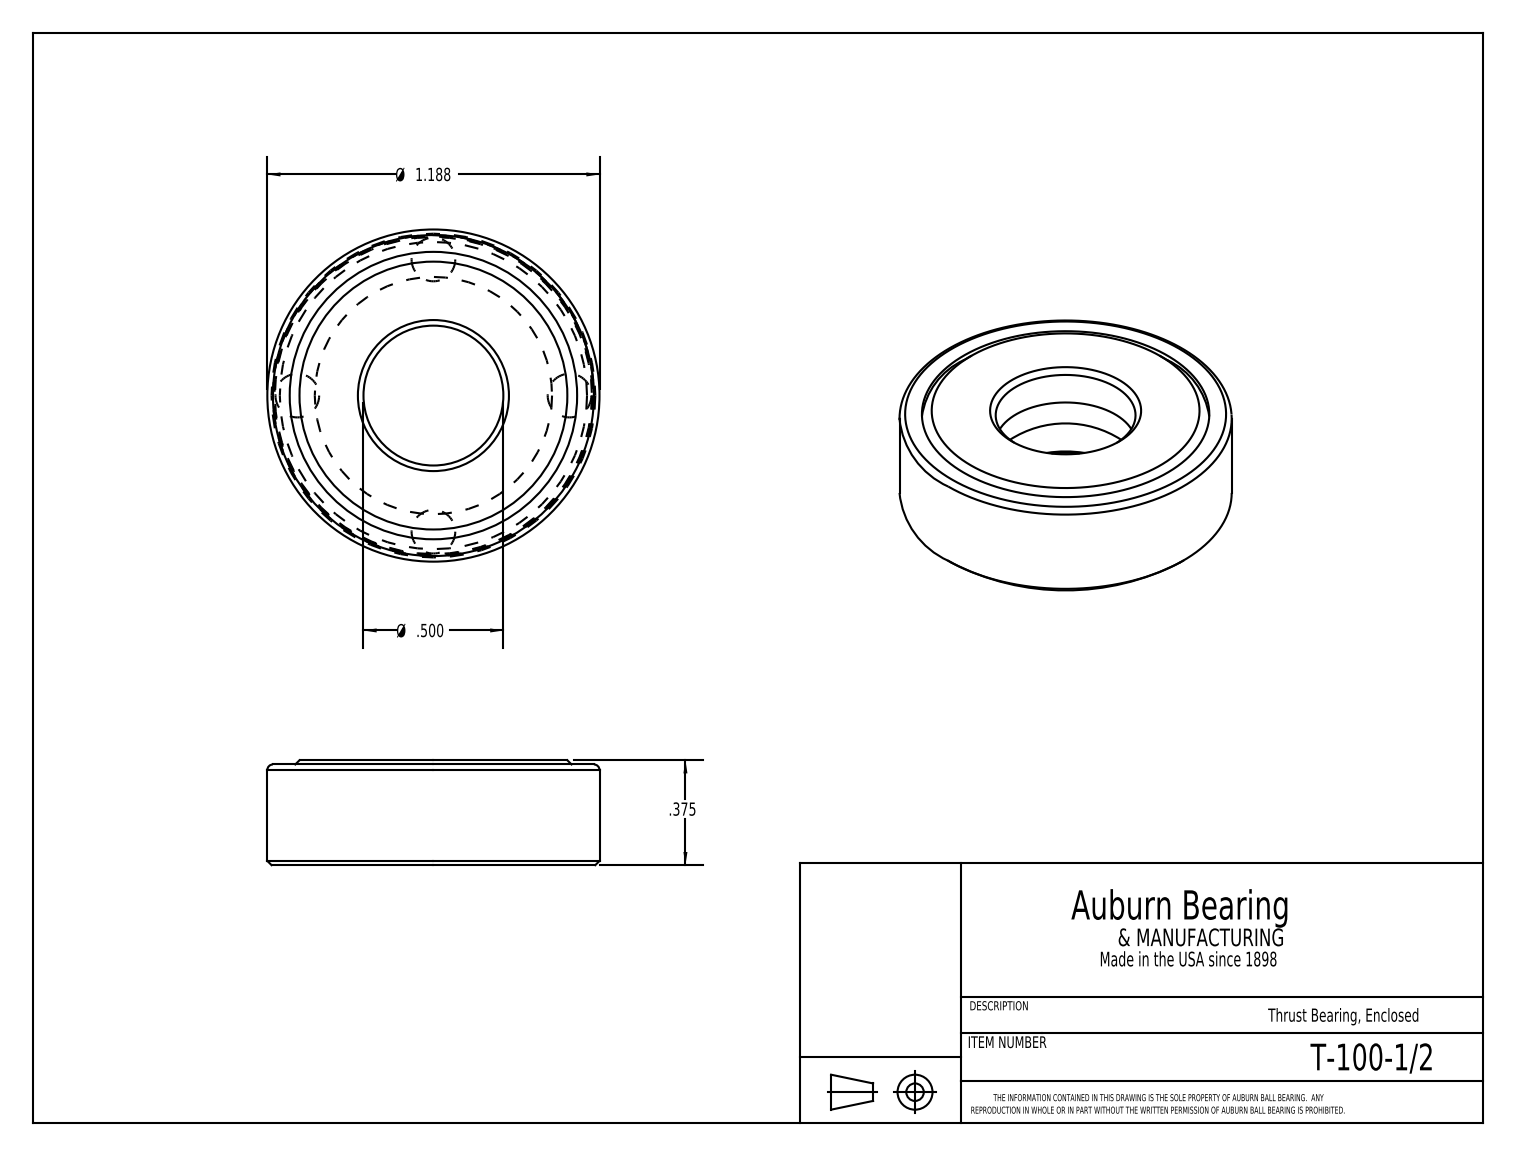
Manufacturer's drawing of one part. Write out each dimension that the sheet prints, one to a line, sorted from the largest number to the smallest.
Ø 1.188
Ø .500
.375
